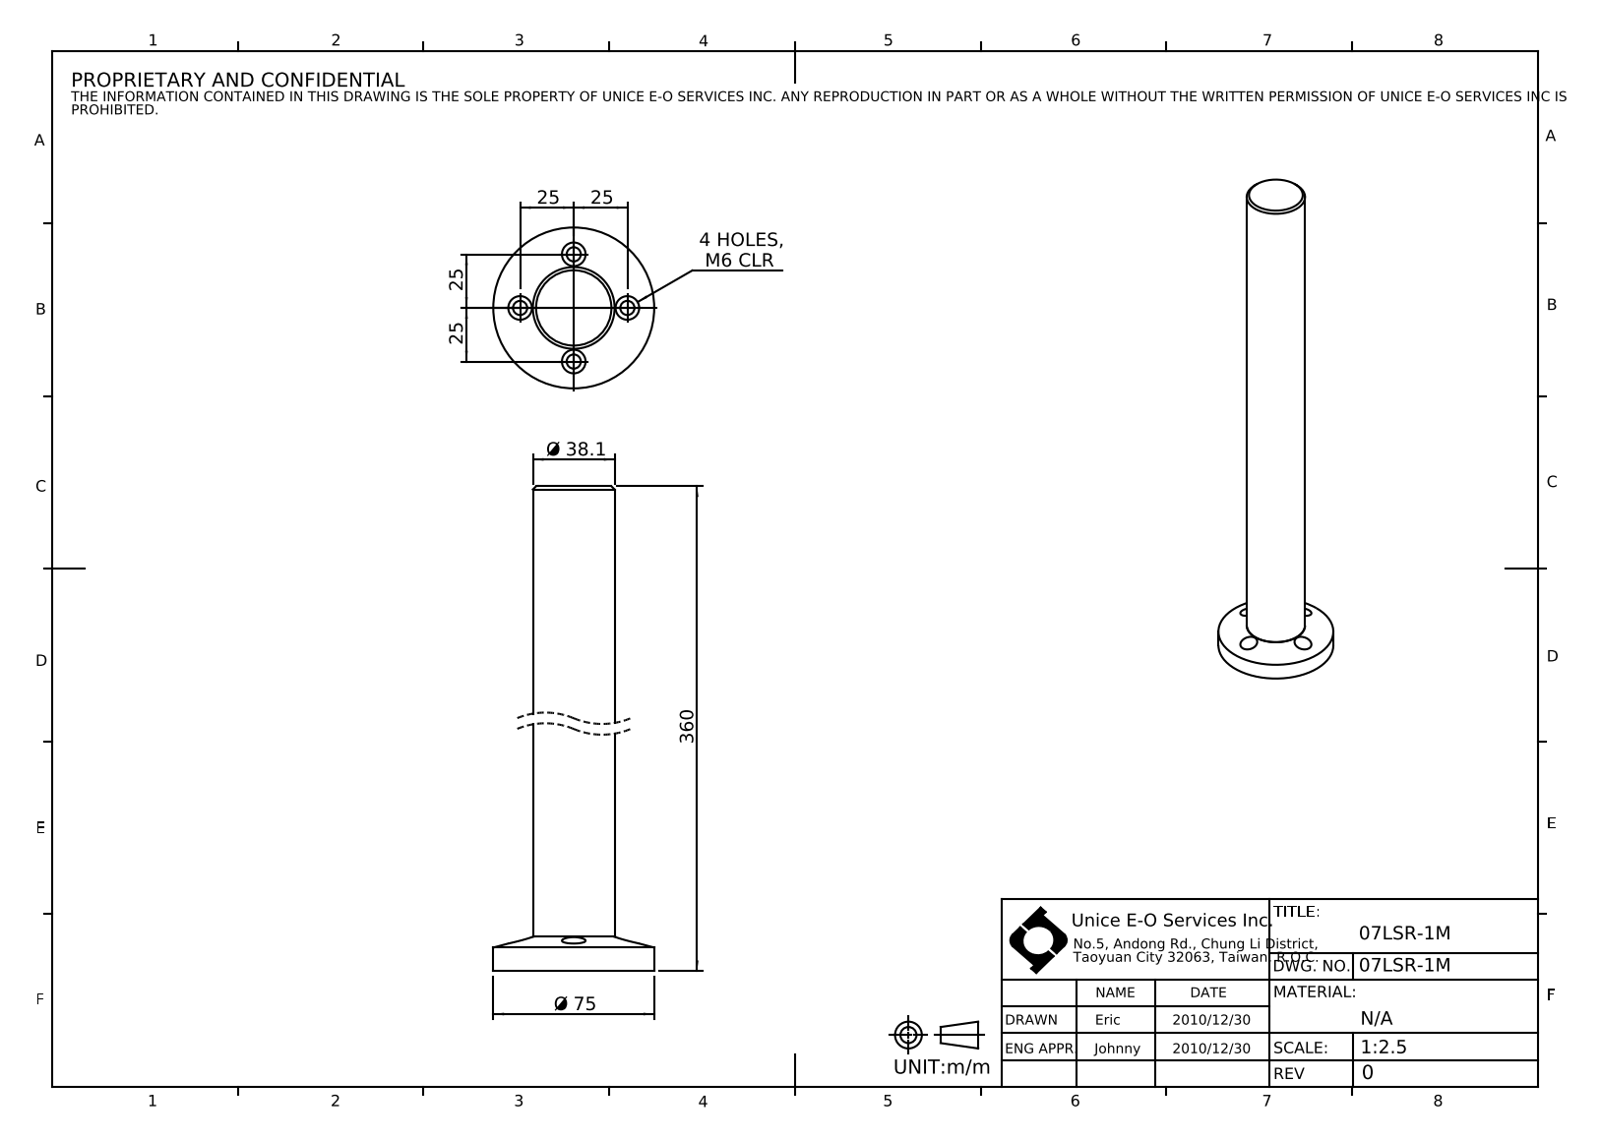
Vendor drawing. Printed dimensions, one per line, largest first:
360
Ø 75
Ø 38.1
25
25
25
25
4 HOLES, M6 CLR
